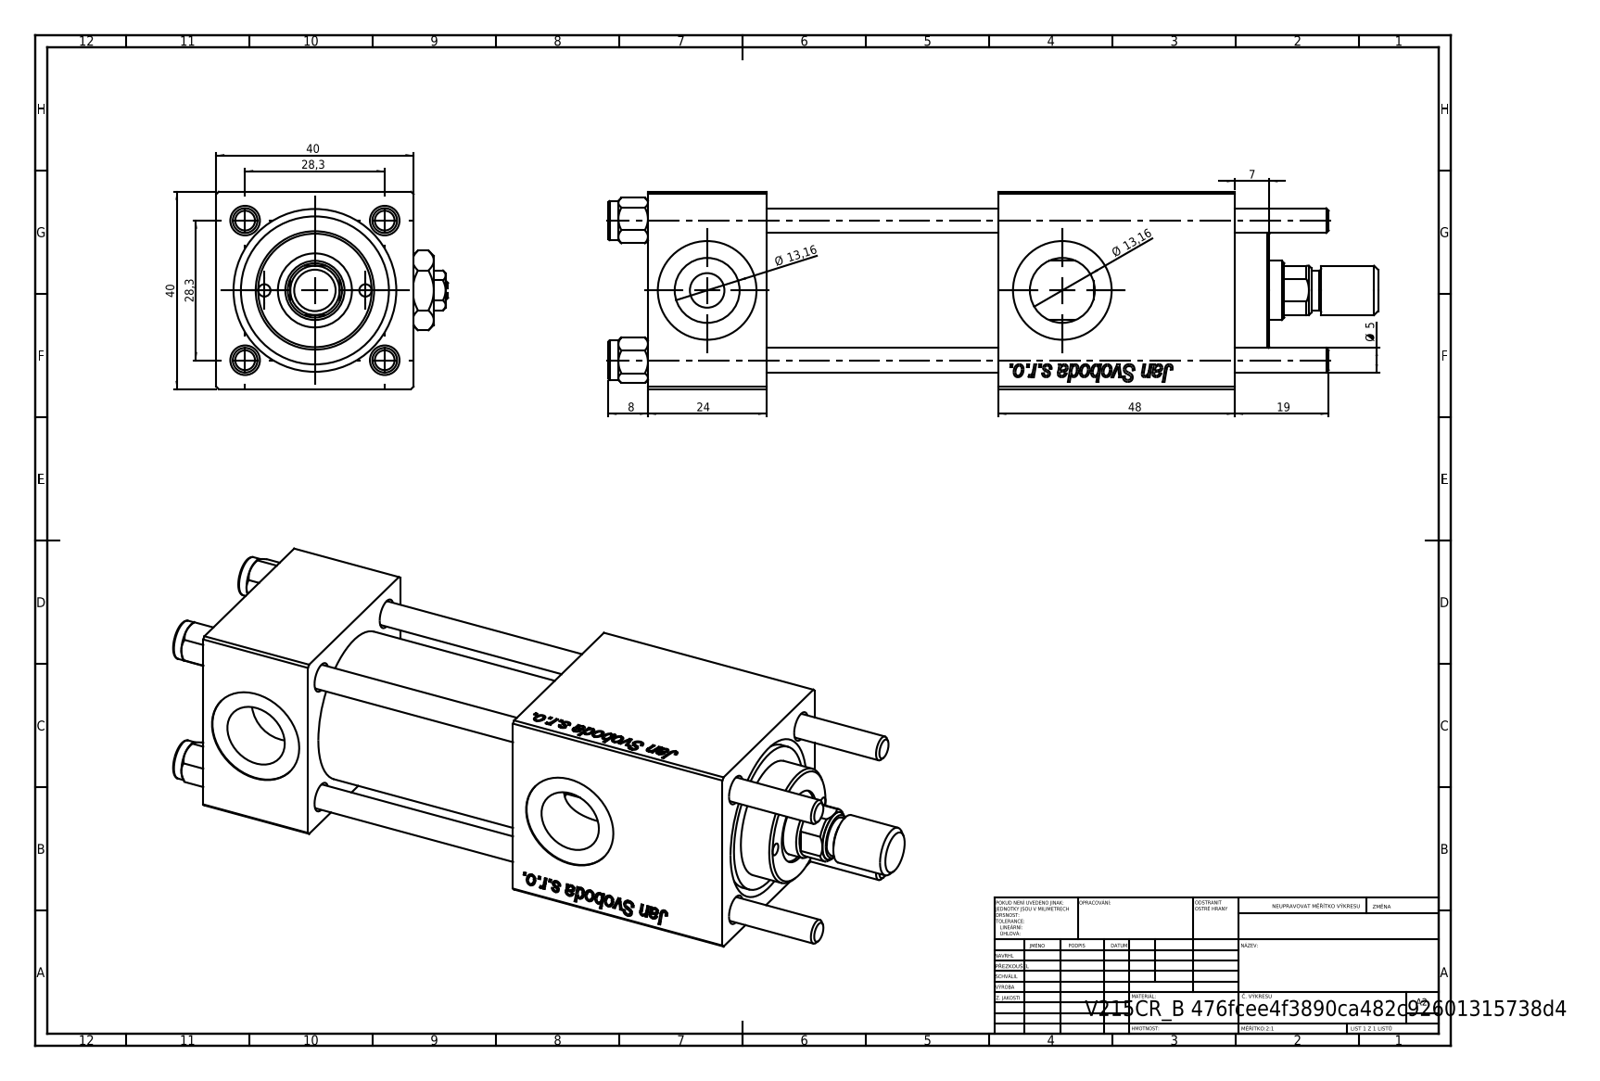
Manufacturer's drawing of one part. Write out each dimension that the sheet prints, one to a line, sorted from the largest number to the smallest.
48
40
40
28,3
28,3
24
19
Ø 13,16
Ø 13,16
8
7
Ø 5
